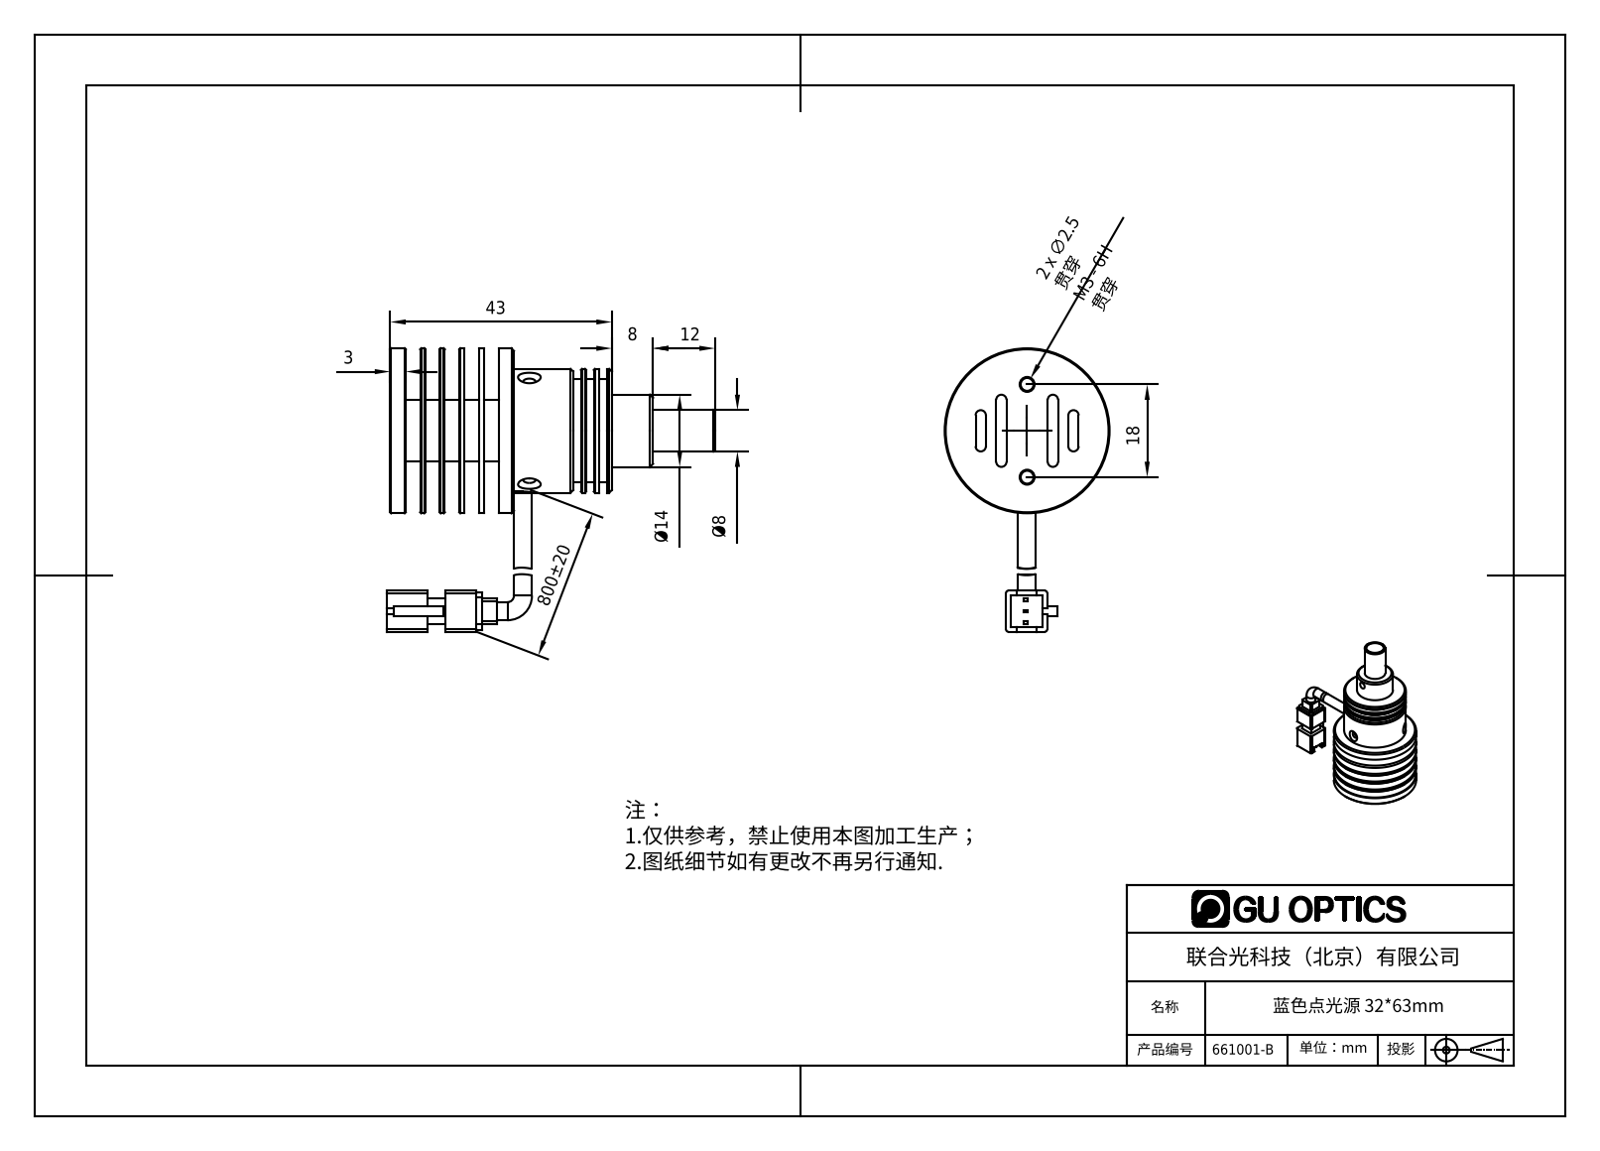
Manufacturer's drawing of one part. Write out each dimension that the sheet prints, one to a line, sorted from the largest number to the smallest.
800±20
43
18
Ø14
12
Ø8
8
3
2 x ∅2.5 贯穿 M3 - 6H 贯穿
